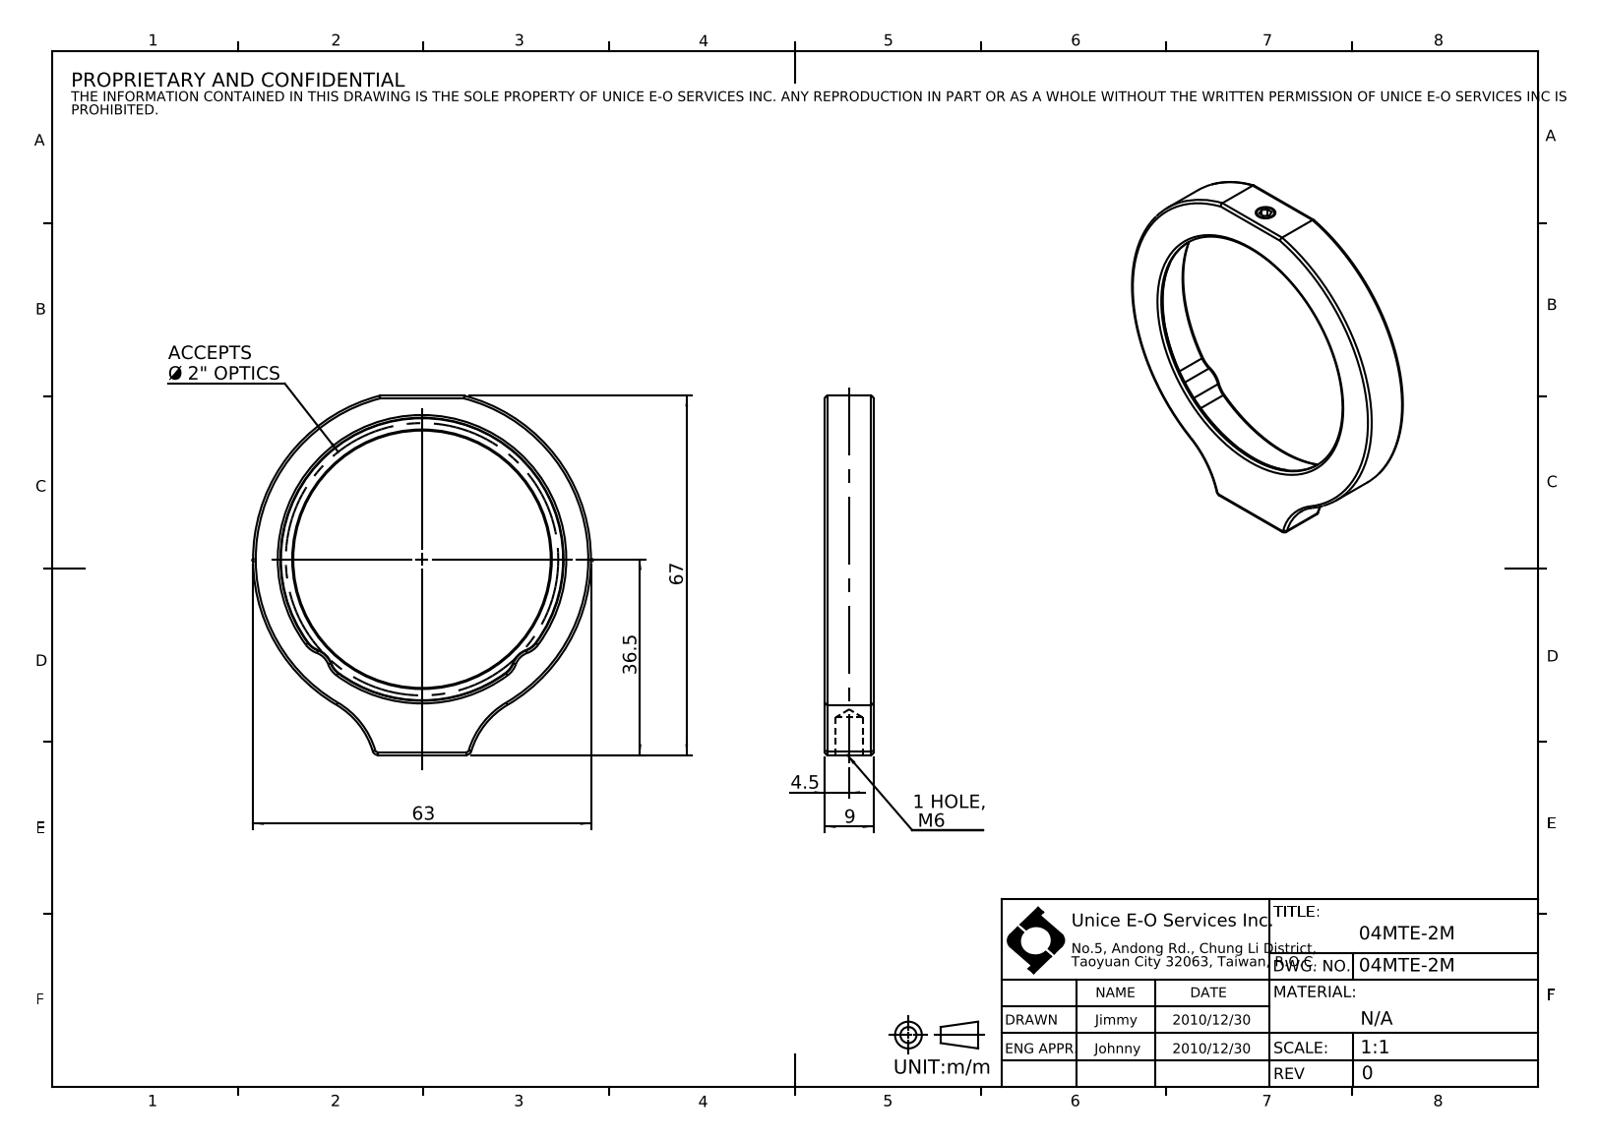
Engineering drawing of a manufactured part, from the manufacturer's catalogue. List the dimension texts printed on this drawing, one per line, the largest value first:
67
63
36.5
9
4.5
ACCEPTS Ø 2" OPTICS
